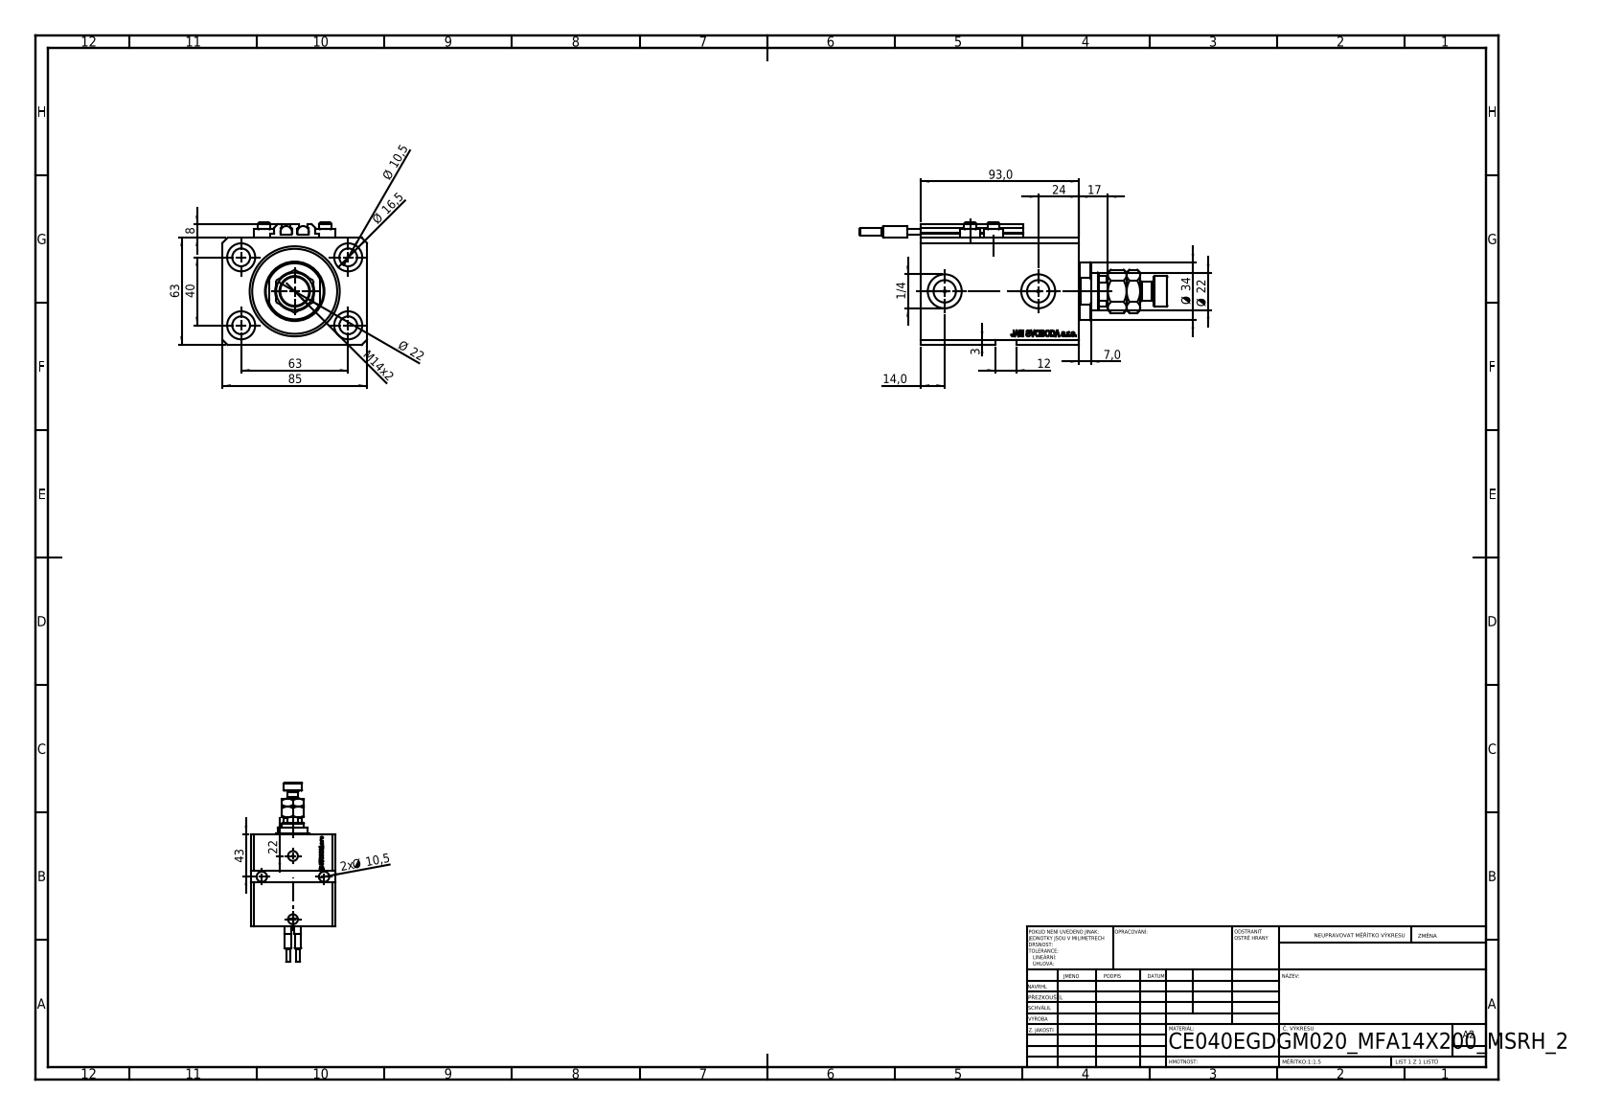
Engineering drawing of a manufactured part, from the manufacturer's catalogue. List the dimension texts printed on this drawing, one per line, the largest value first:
93,0
85
63
63
43
40
Ø 34
24
Ø 22
Ø 22
22
17
Ø 16,5
M14x2
14,0
12
Ø 10,5
2x Ø 10,5
8
7,0
3
1/4
